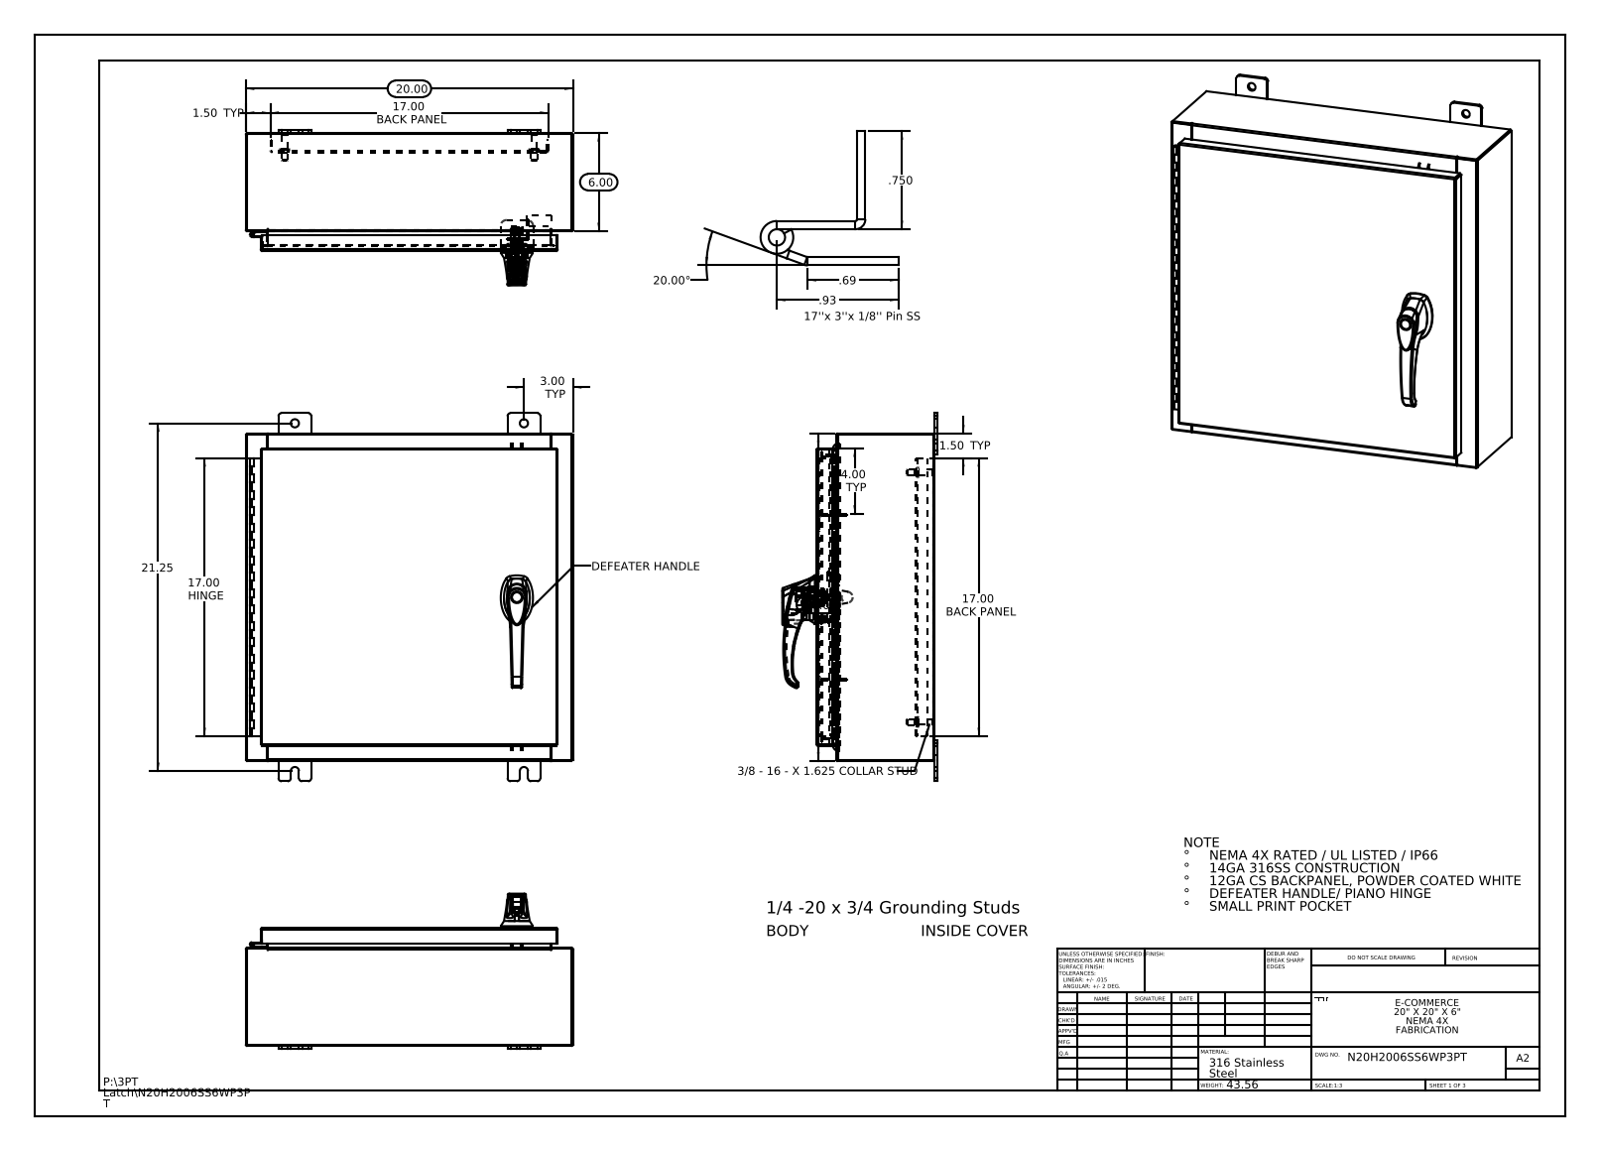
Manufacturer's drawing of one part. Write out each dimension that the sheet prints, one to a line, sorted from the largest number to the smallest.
21.25
20.00
20.00
20.00°
17.00 HINGE
17.00 BACK PANEL
17.00 BACK PANEL
6.00
4.00 TYP
3.00 TYP
1.50 TYP
1.50 TYP
.93
.750
.69
